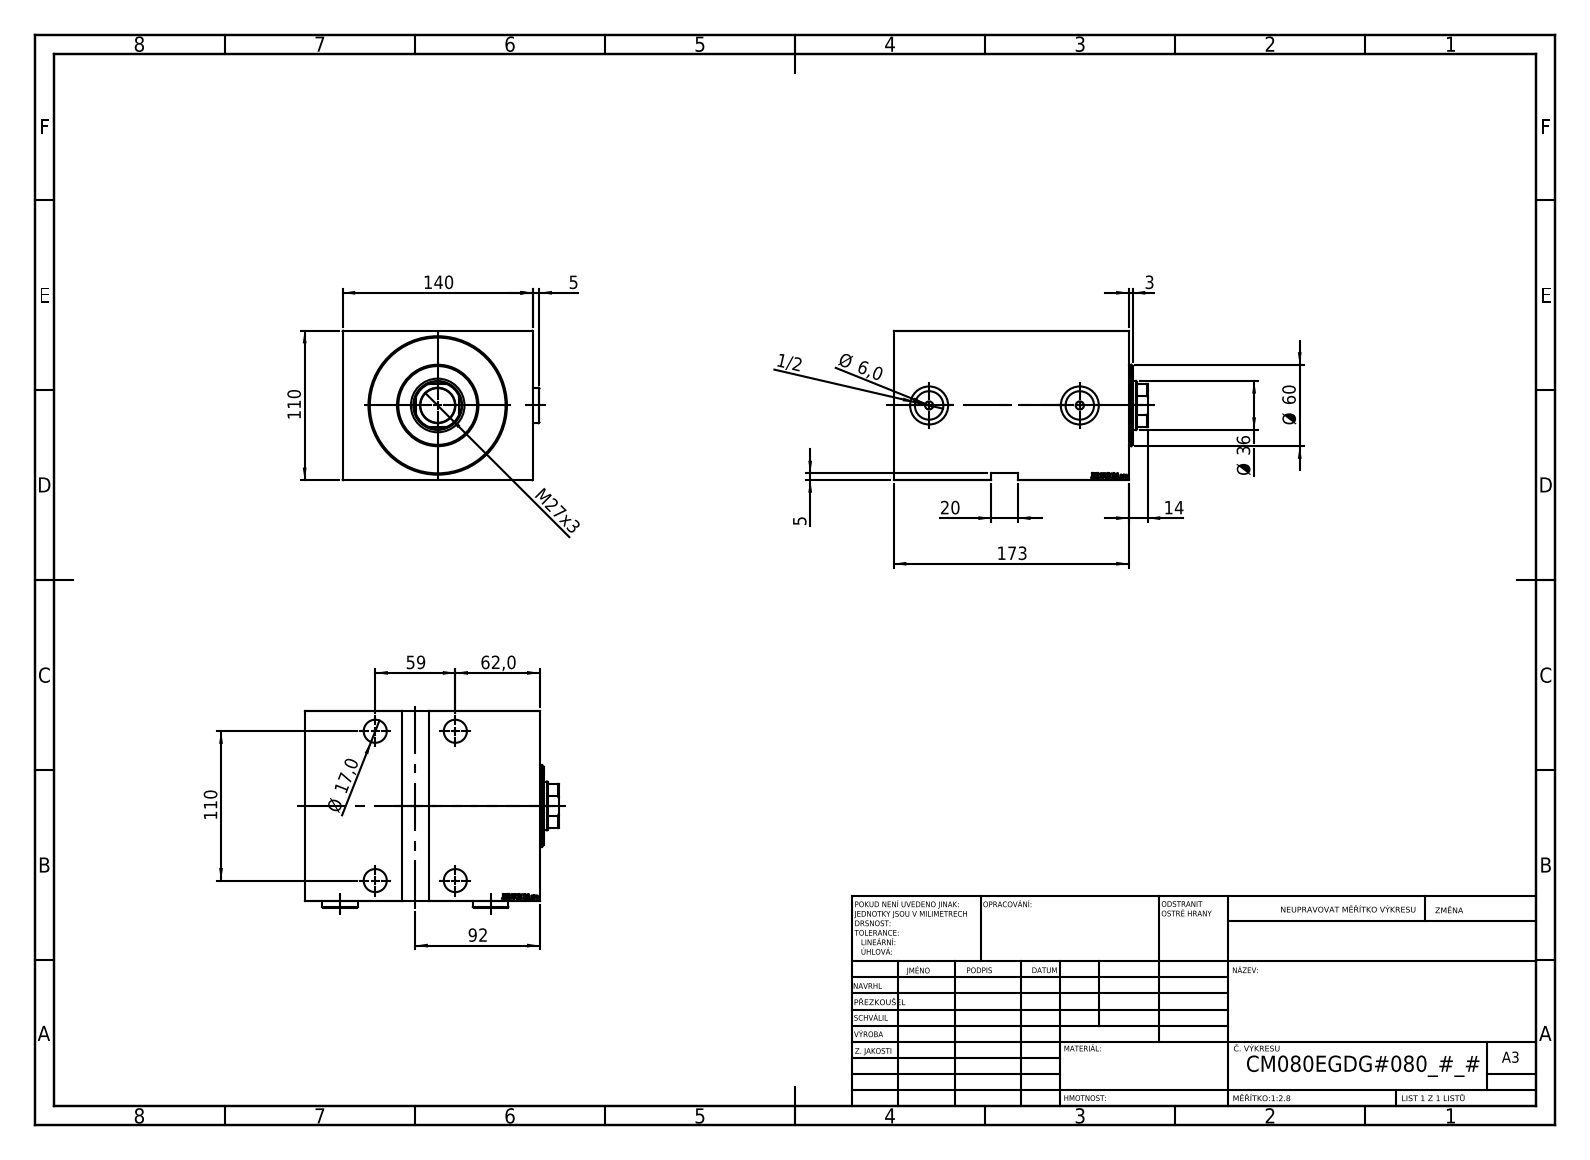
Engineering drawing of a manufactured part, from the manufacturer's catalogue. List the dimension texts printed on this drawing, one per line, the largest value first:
173
140
110
110
92
62,0
Ø 60
59
Ø 36
M27x3
20
Ø 17,0
14
Ø 6,0
5
5
3
1/2
